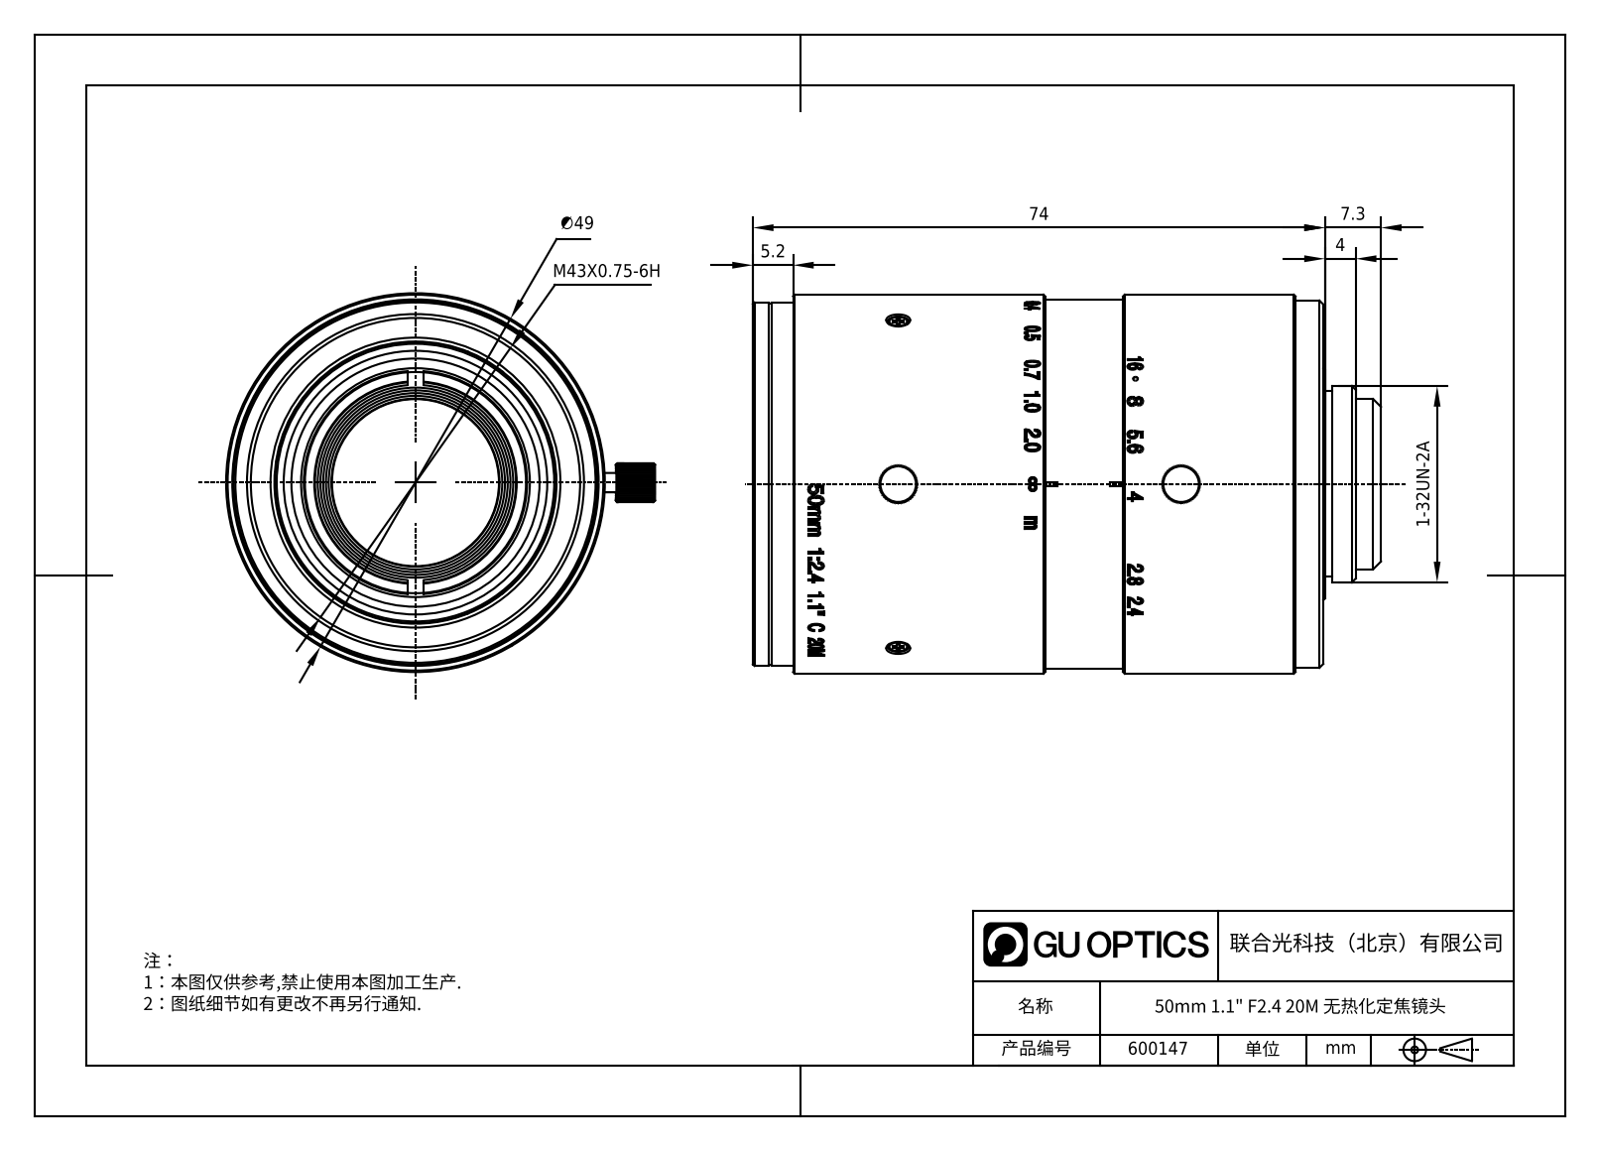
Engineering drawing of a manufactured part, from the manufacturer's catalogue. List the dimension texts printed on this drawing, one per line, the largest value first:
74
∅49
M43X0.75-6H
7.3
5.2
4
1-32UN-2A
